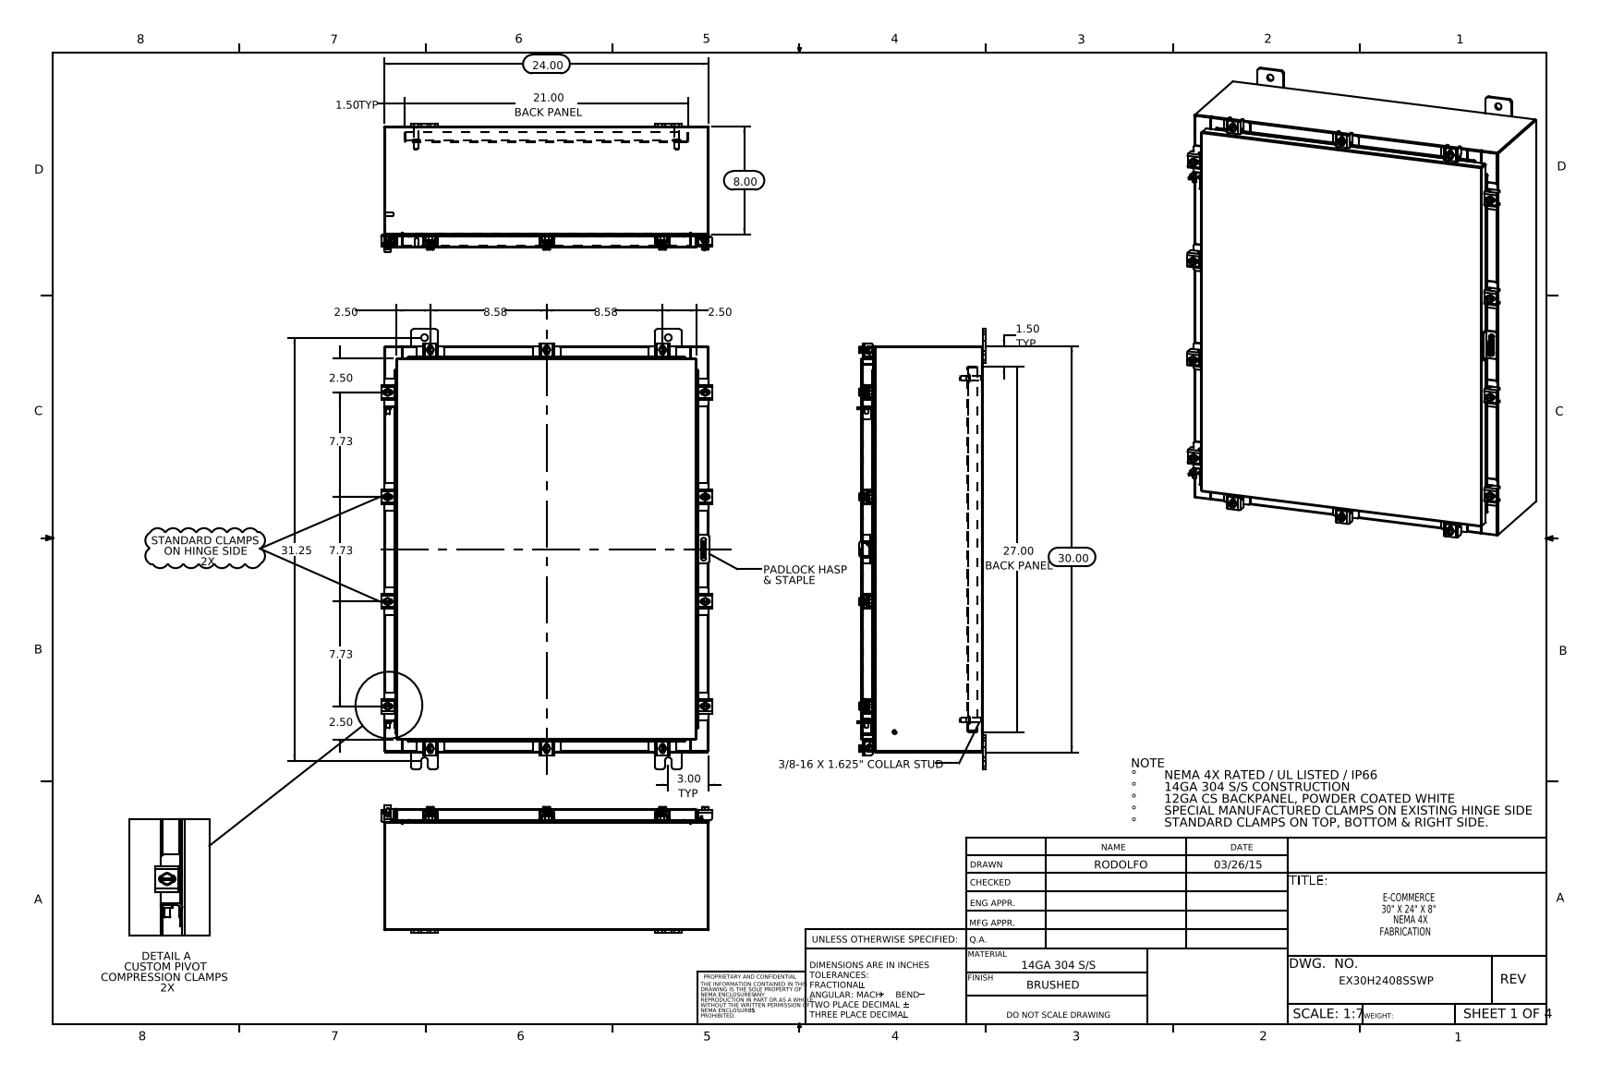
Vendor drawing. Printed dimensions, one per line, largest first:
31.25
30.00
27.00 BACK PANEL
24.00
21.00 BACK PANEL
8.58
8.58
8.00
7.73
7.73
7.73
3.00 TYP
2.50
2.50
2.50
2.50
1.50 TYP
1.50 TYP
